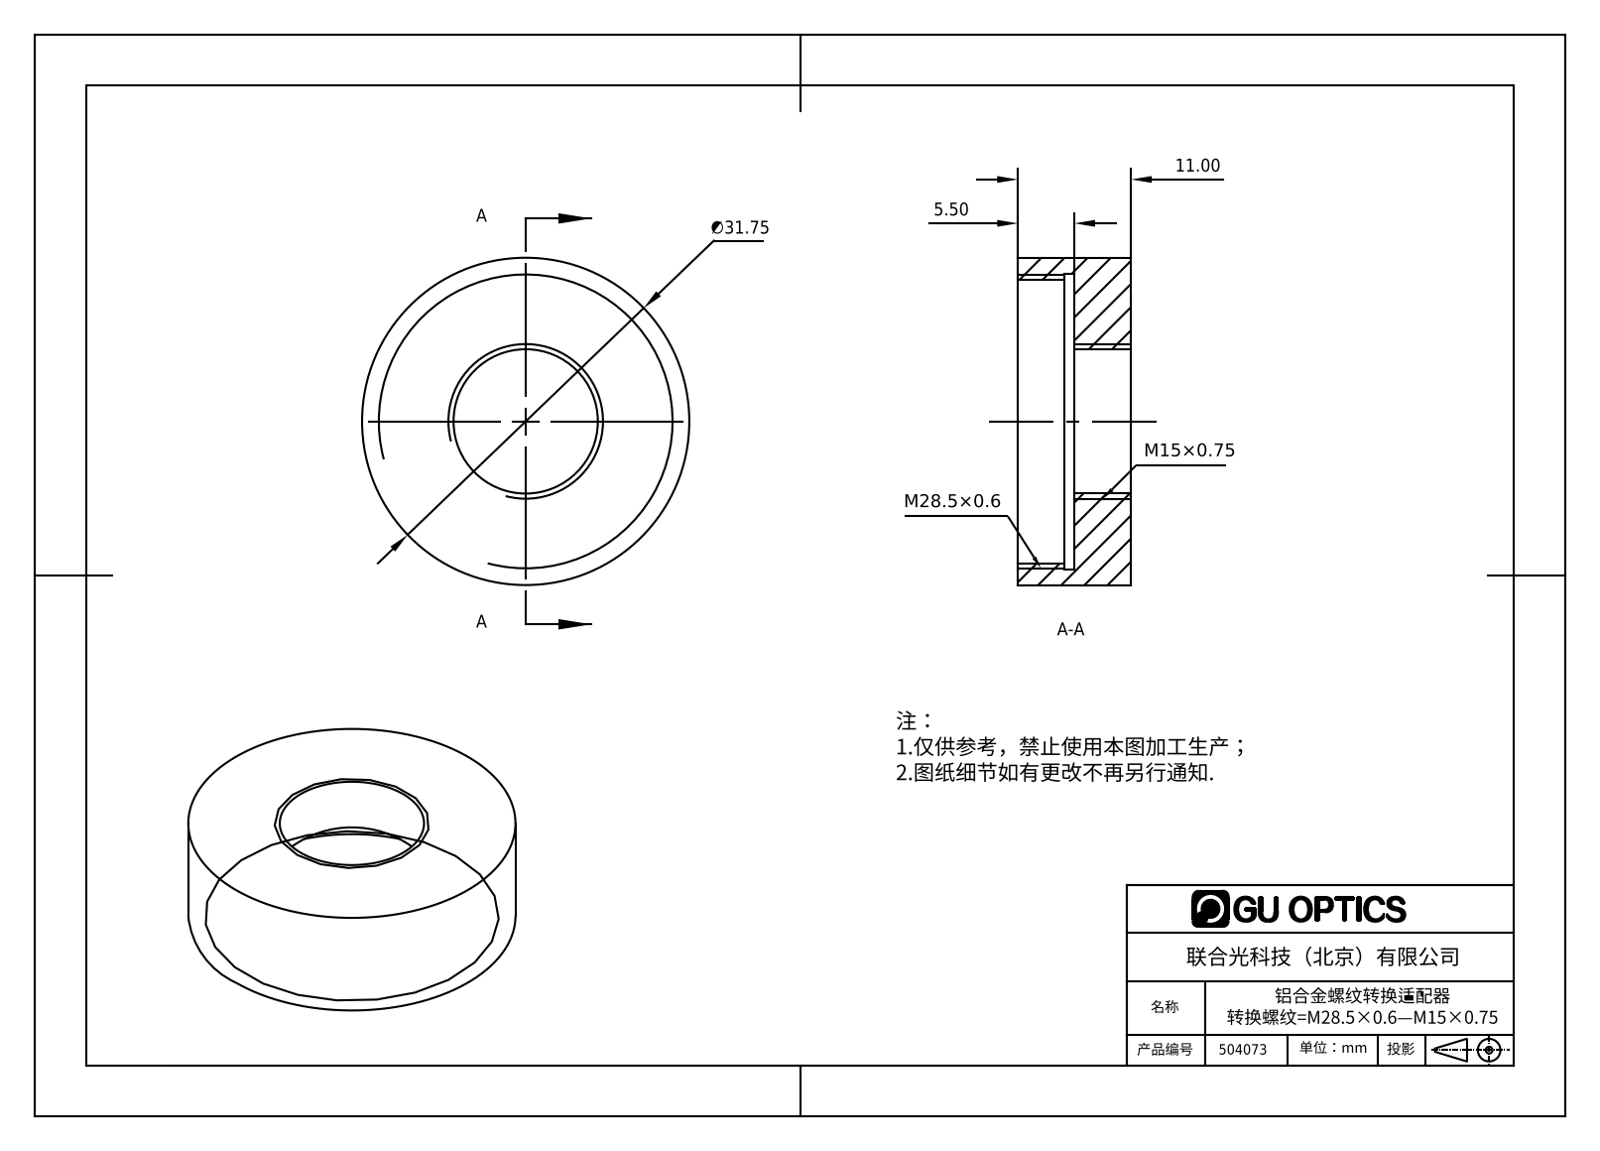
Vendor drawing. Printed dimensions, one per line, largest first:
∅31.75
11.00
5.50
